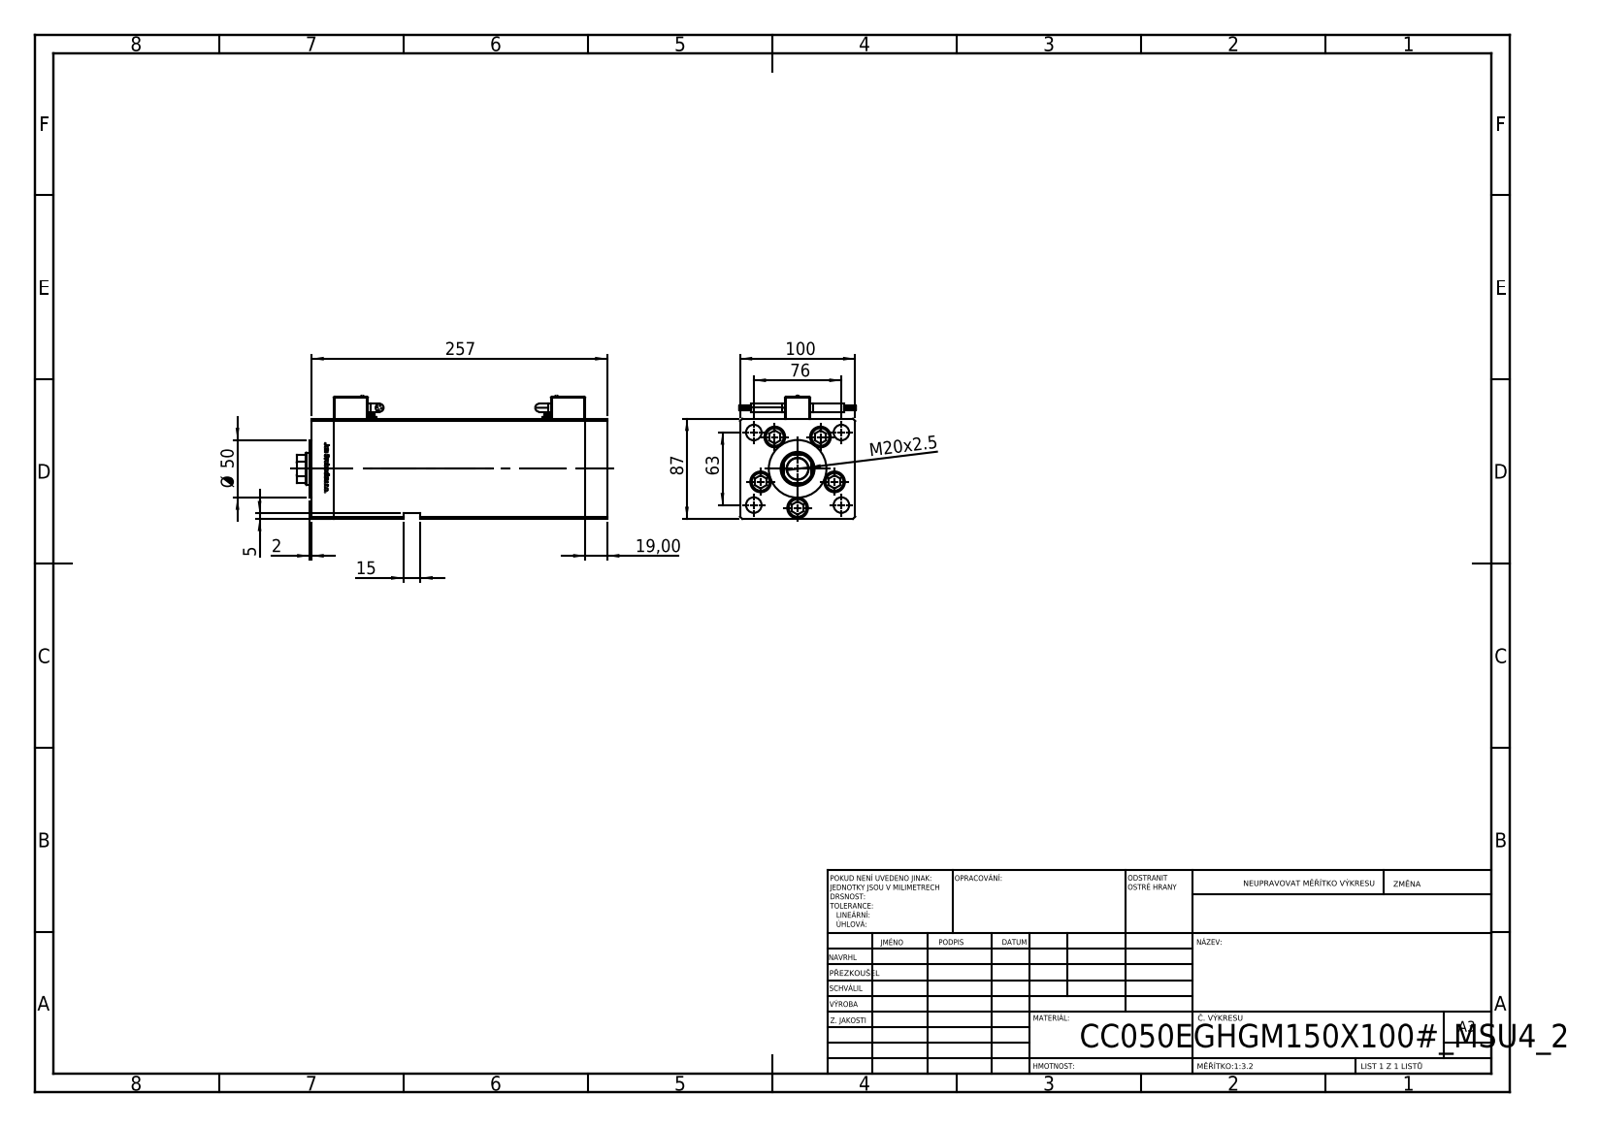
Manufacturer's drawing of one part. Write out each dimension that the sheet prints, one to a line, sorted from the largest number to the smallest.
257
100
87
76
63
Ø 50
M20x2.5
19,00
15
5
2
